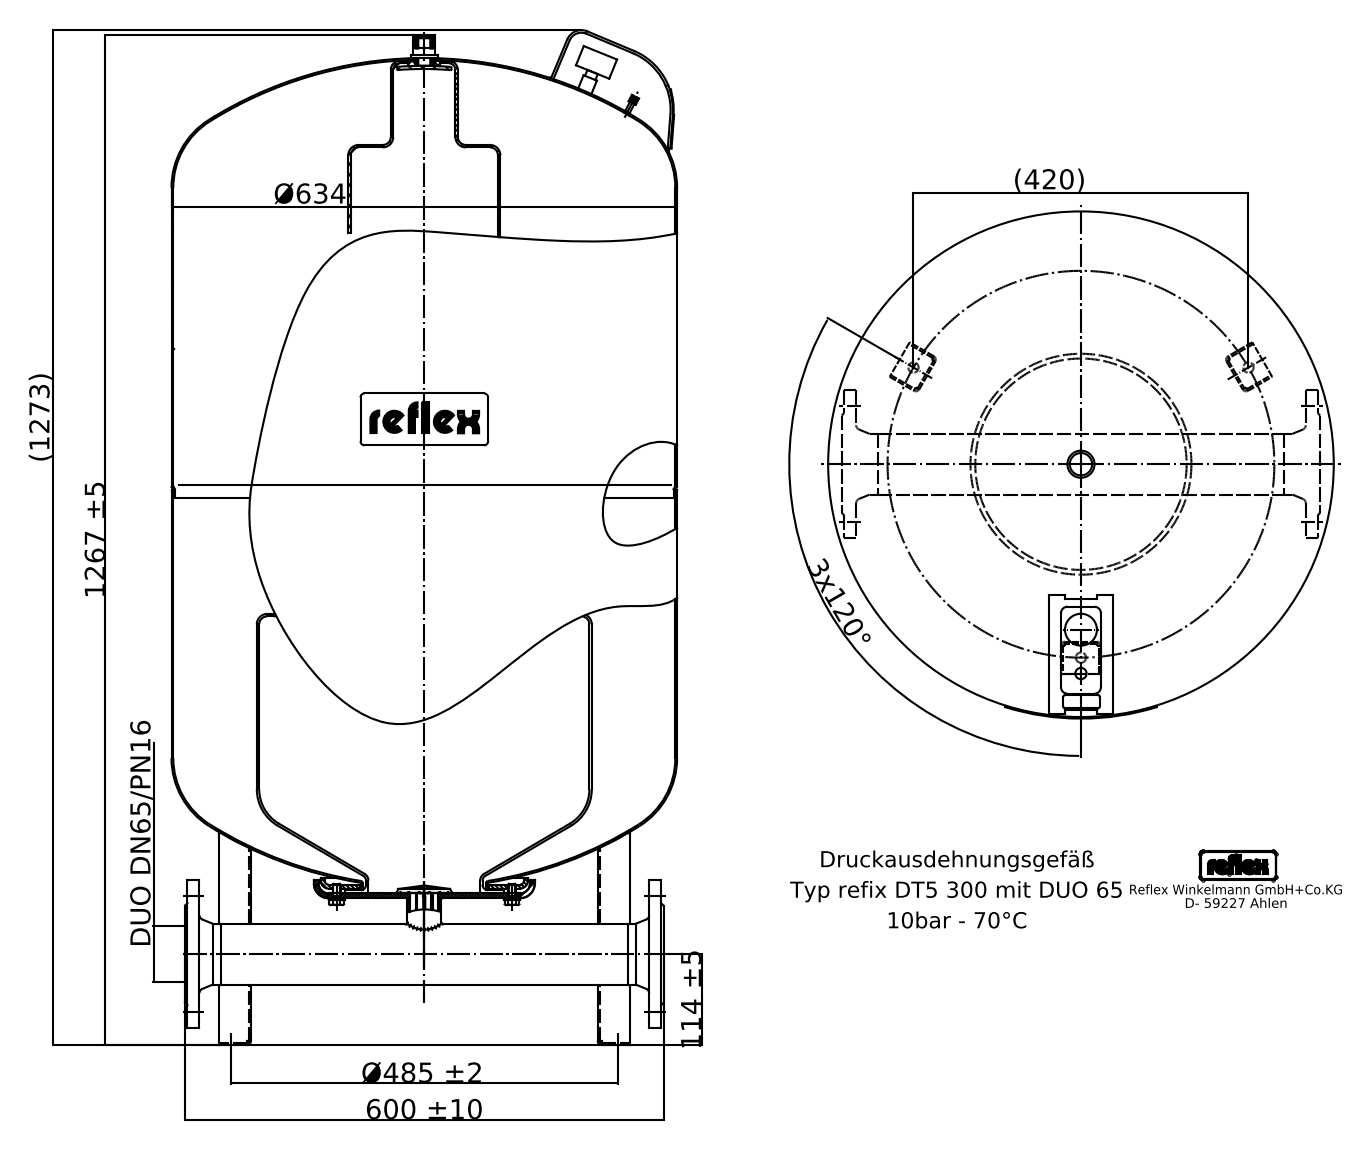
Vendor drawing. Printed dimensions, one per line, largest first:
(1273)
1267 ±5
Ø634
600 ±10
Ø485 ±2
(420)
3x120°
114 ±5
DUO DN65/PN16
